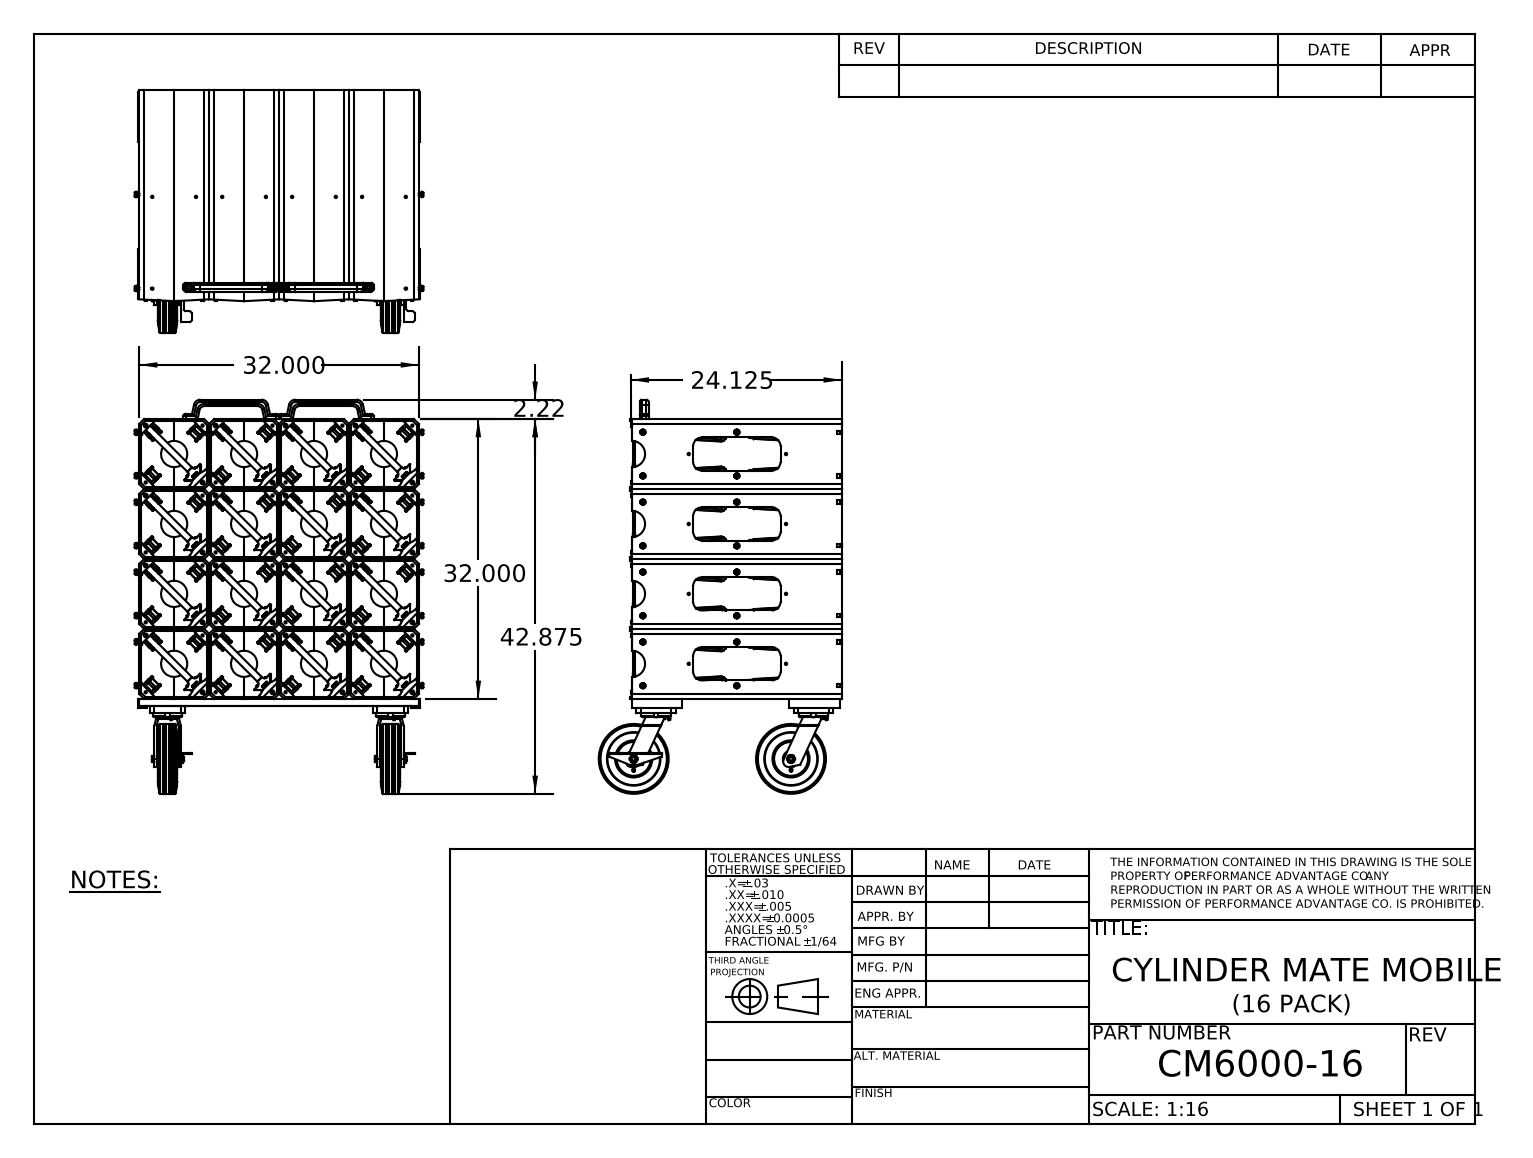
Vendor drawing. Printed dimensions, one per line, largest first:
42.875
32.000
32.000
24.125
2.22
